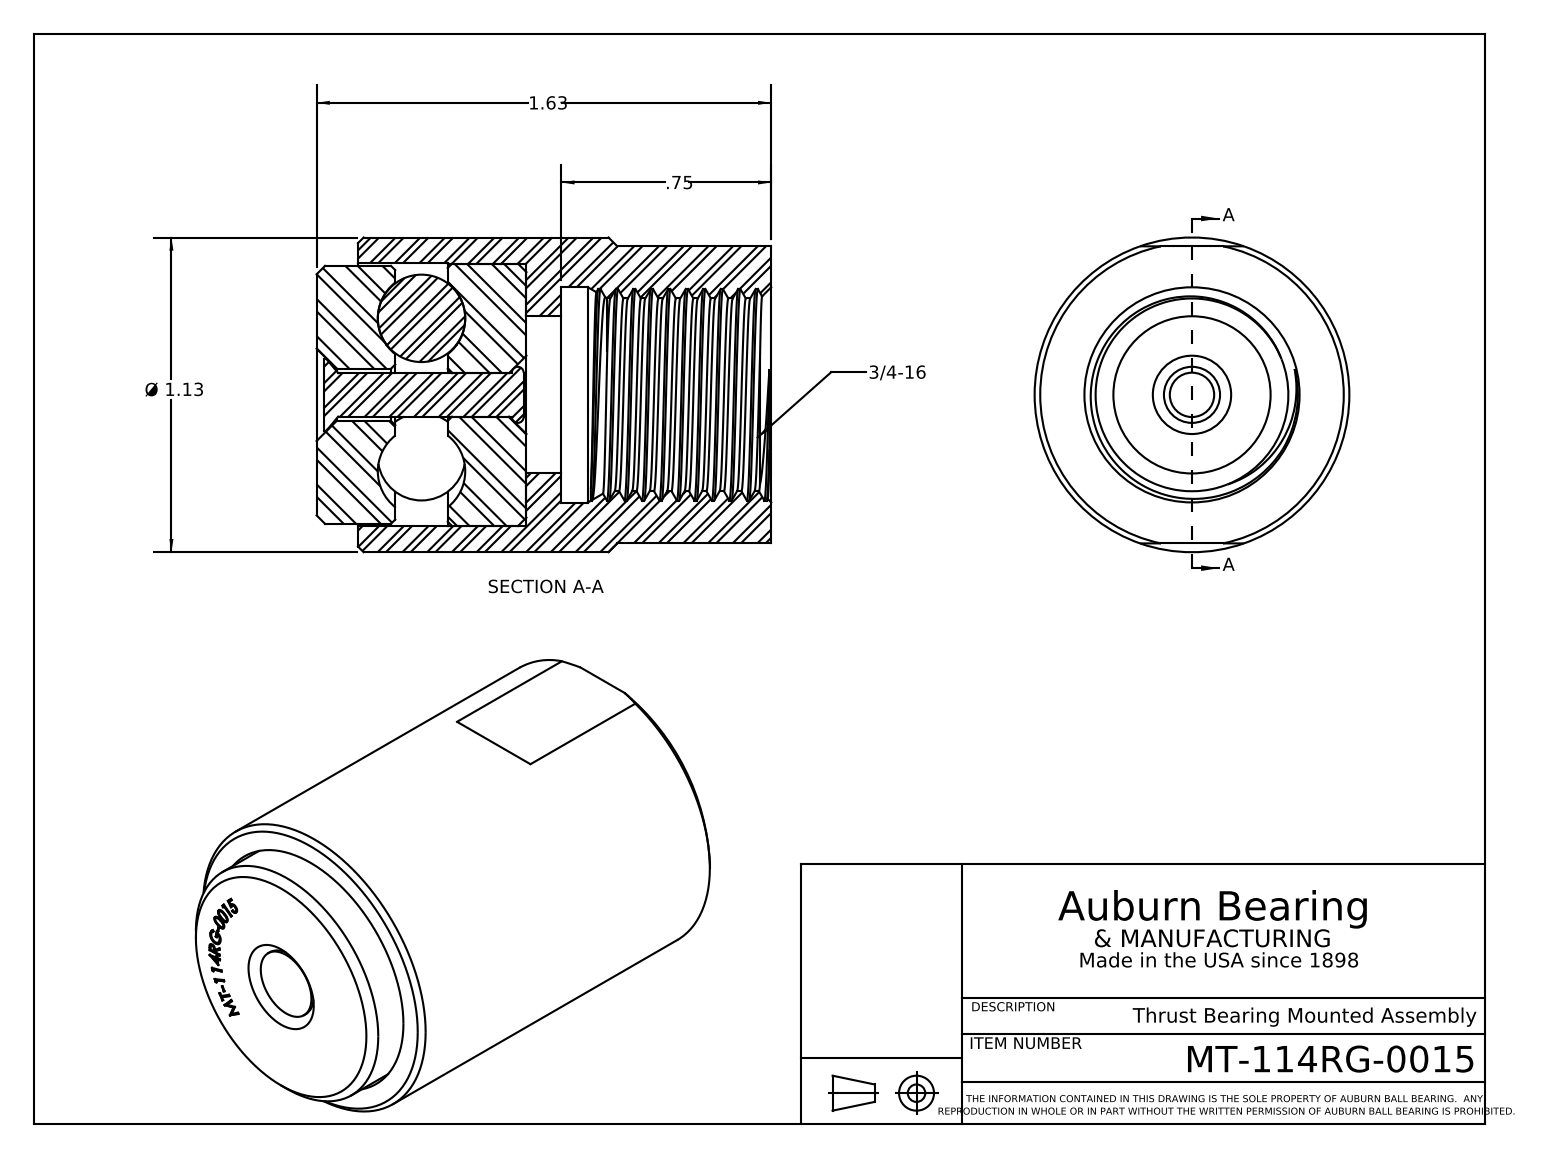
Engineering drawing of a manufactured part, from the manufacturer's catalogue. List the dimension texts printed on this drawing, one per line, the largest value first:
1.63
Ø 1.13
.75
